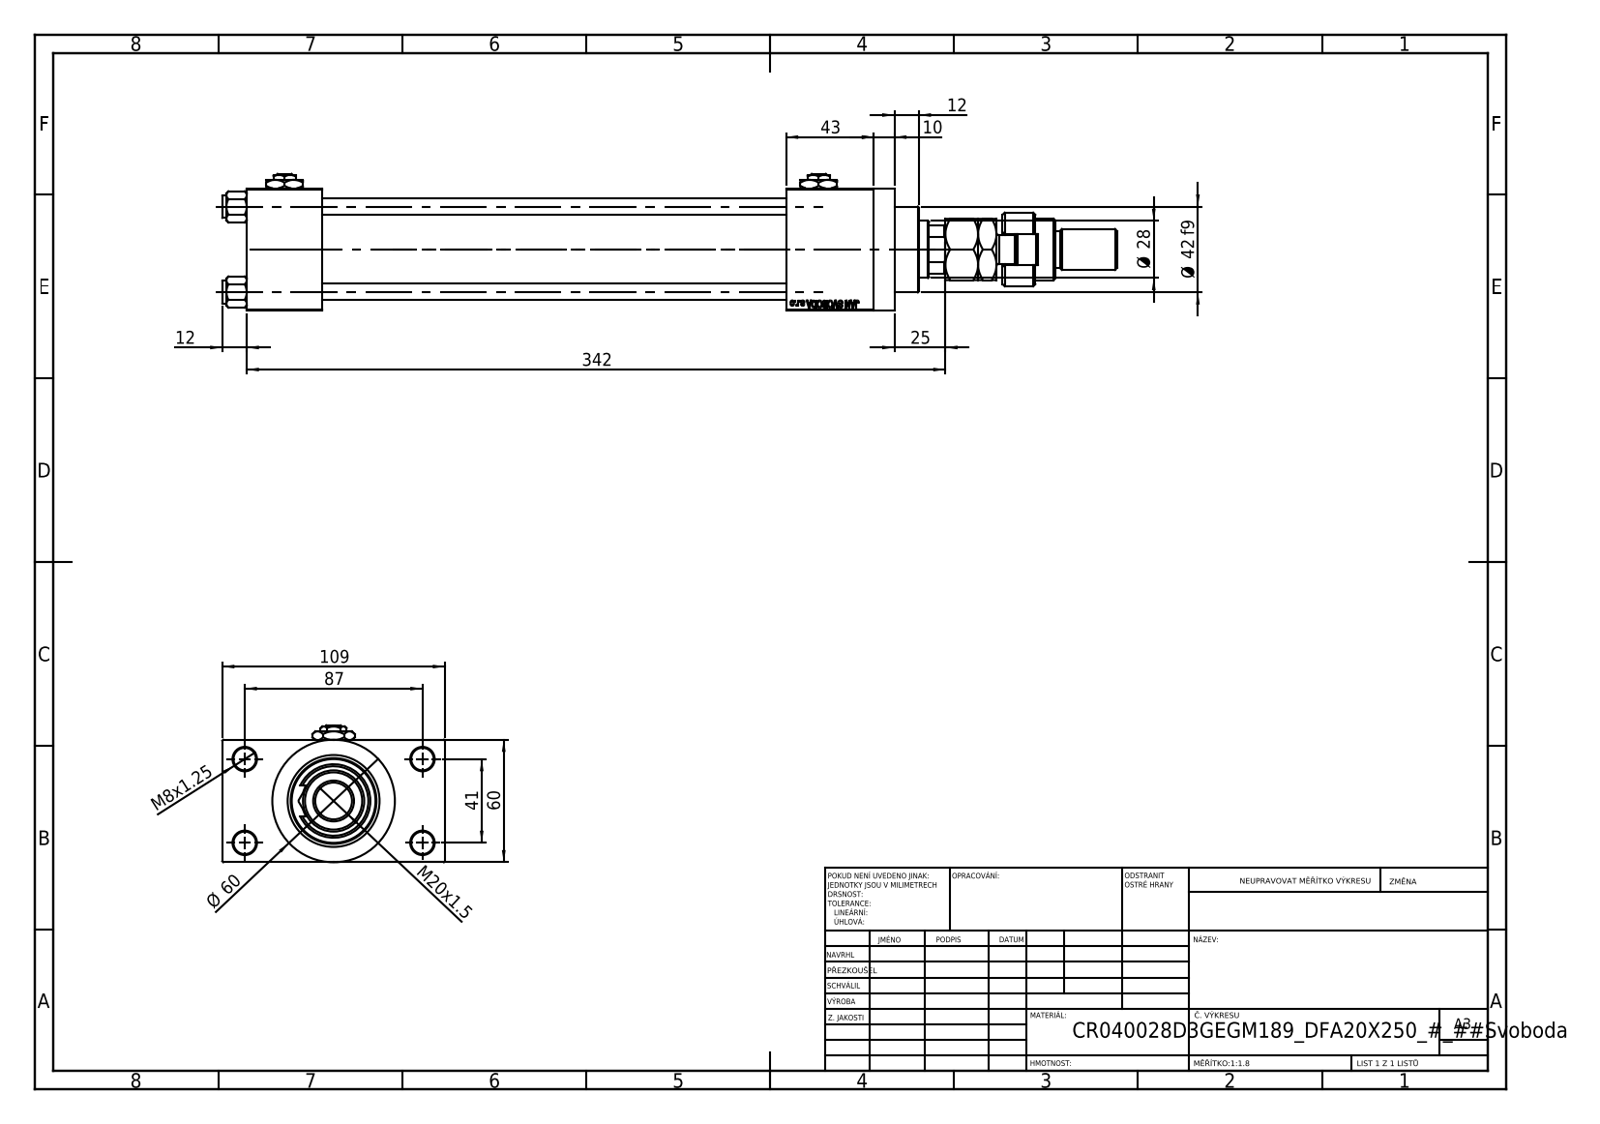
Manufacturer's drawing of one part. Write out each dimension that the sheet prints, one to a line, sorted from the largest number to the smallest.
342
109
87
Ø 60
60
43
Ø 42 f9
41
Ø 28
25
M20x1.5
12
12
10
M8x1.25
